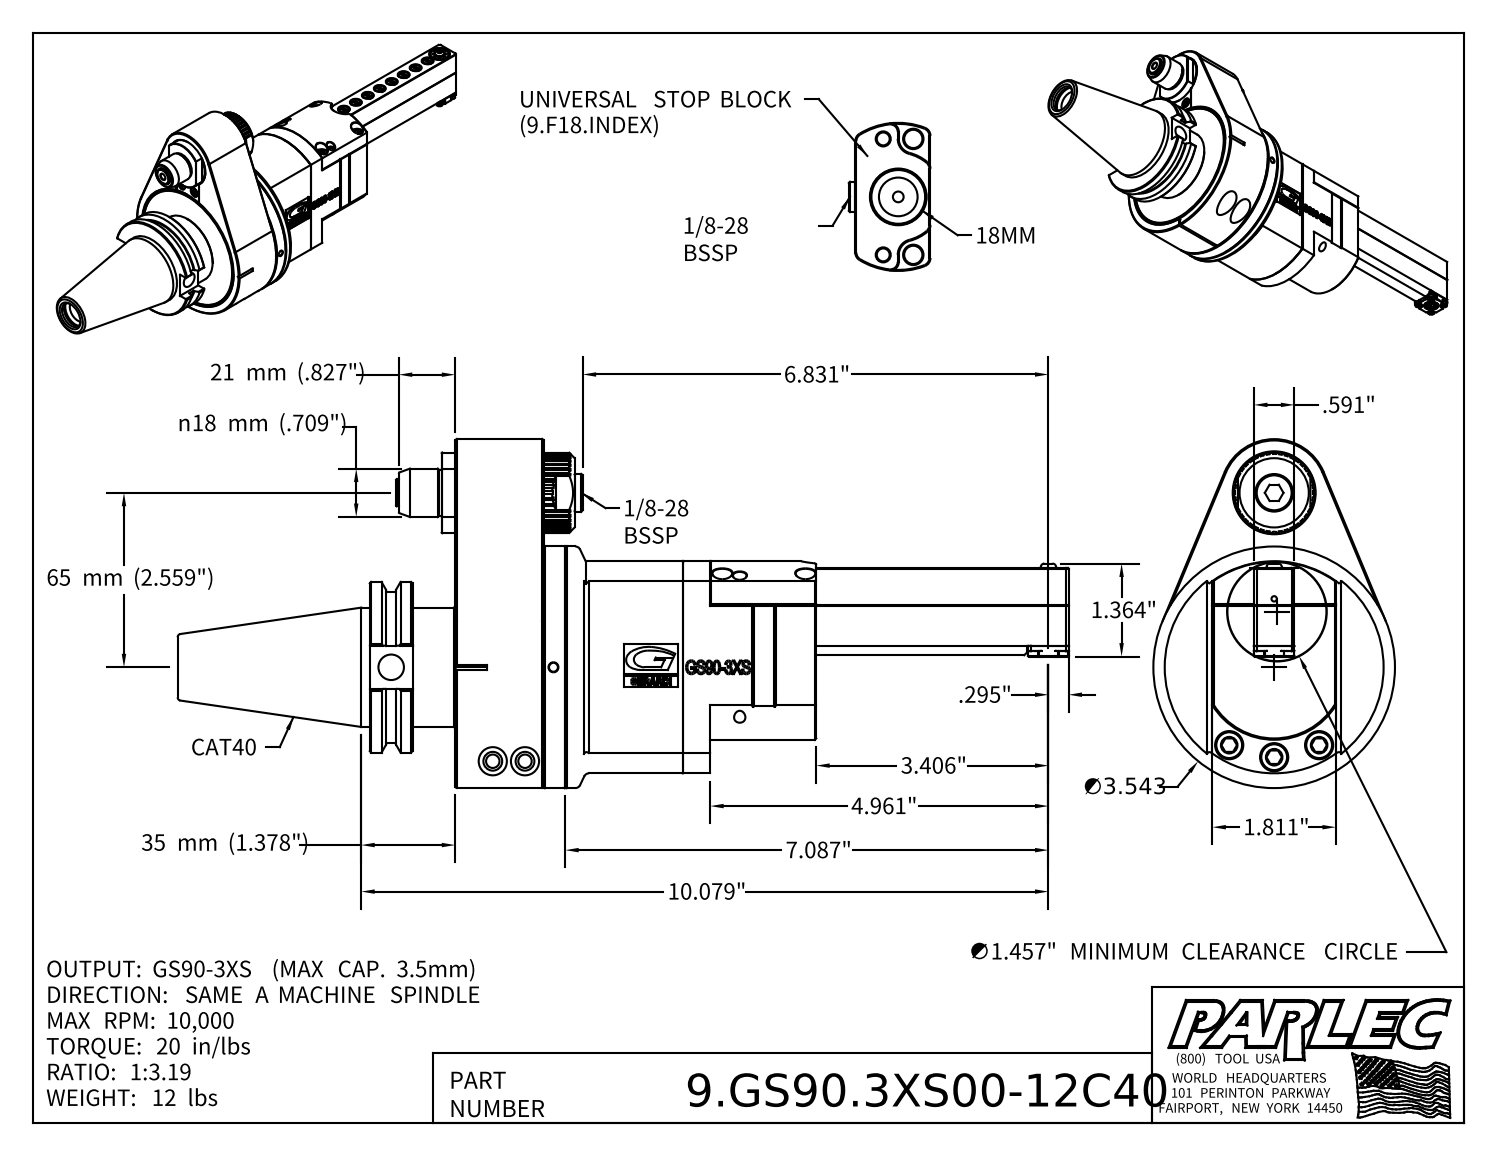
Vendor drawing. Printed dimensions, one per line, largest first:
65 mm (2.559")
35 mm (1.378")
21 mm (.827")
n18 mm (.709")
10.079"
7.087"
6.831"
4.961"
∅3.543
3.406"
1.811"
∅1.457" MINIMUM CLEARANCE CIRCLE
1.364"
.591"
.295"
